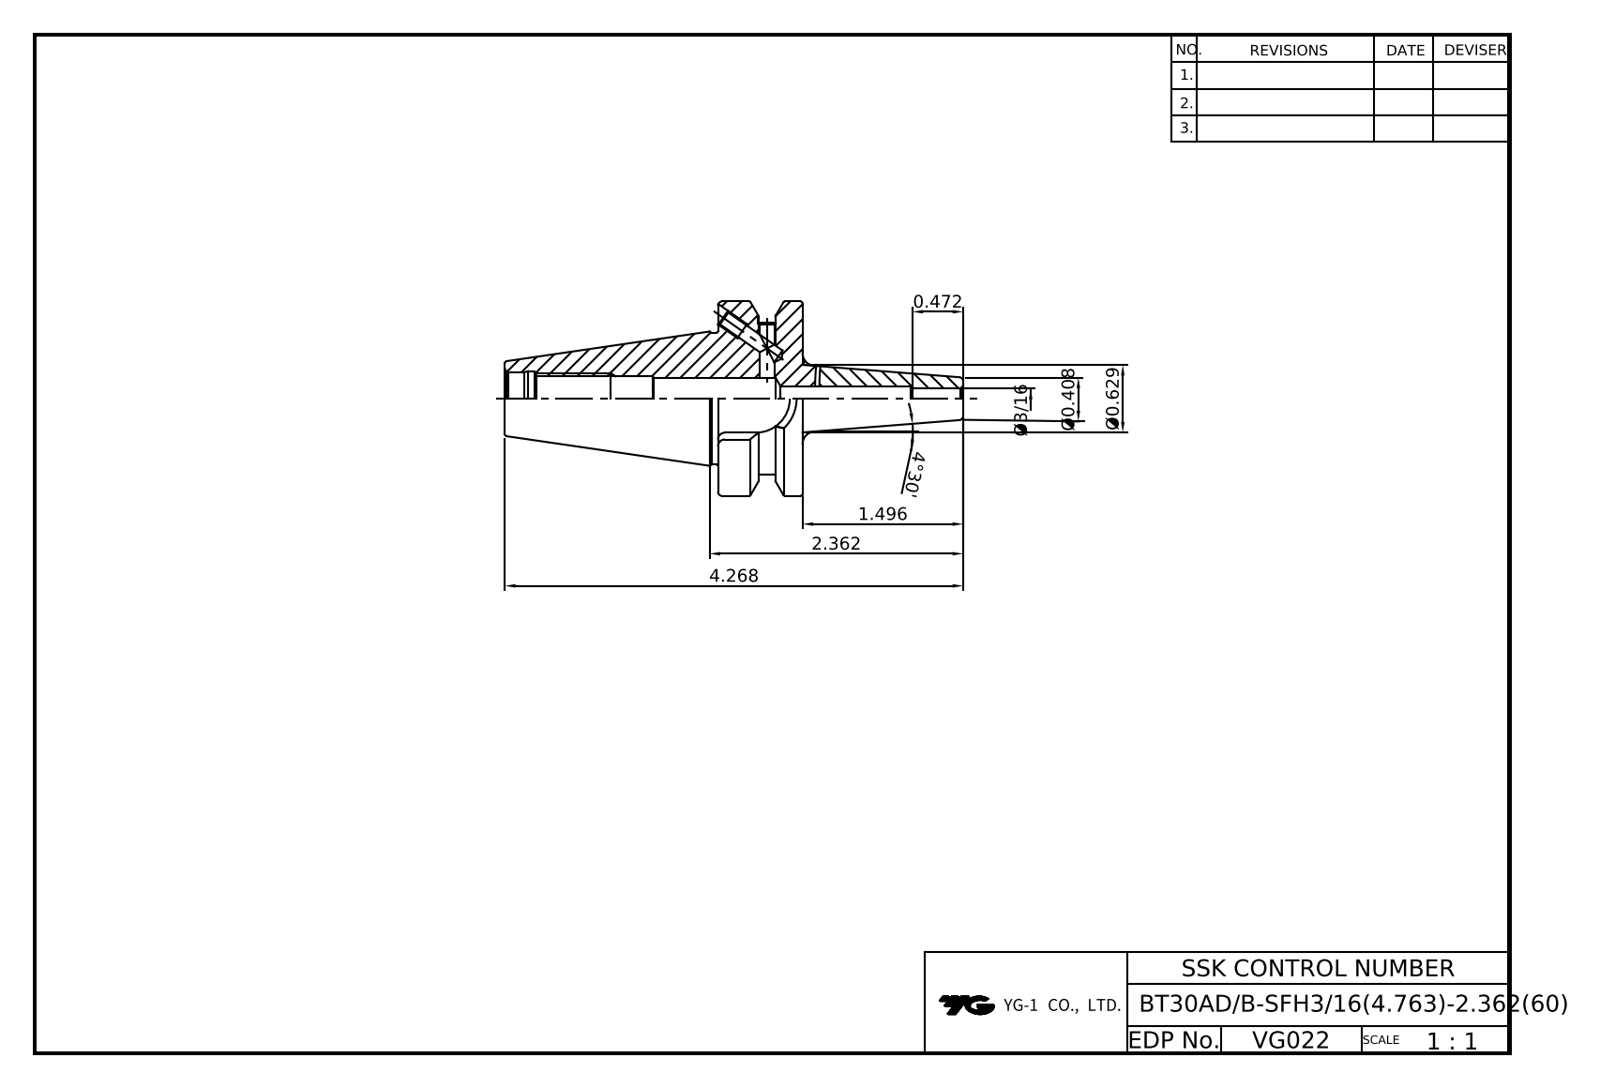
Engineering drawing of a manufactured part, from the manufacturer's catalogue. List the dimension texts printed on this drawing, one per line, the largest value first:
4.268
4°30'
2.362
1.496
Ø0.629
0.472
Ø0.408
